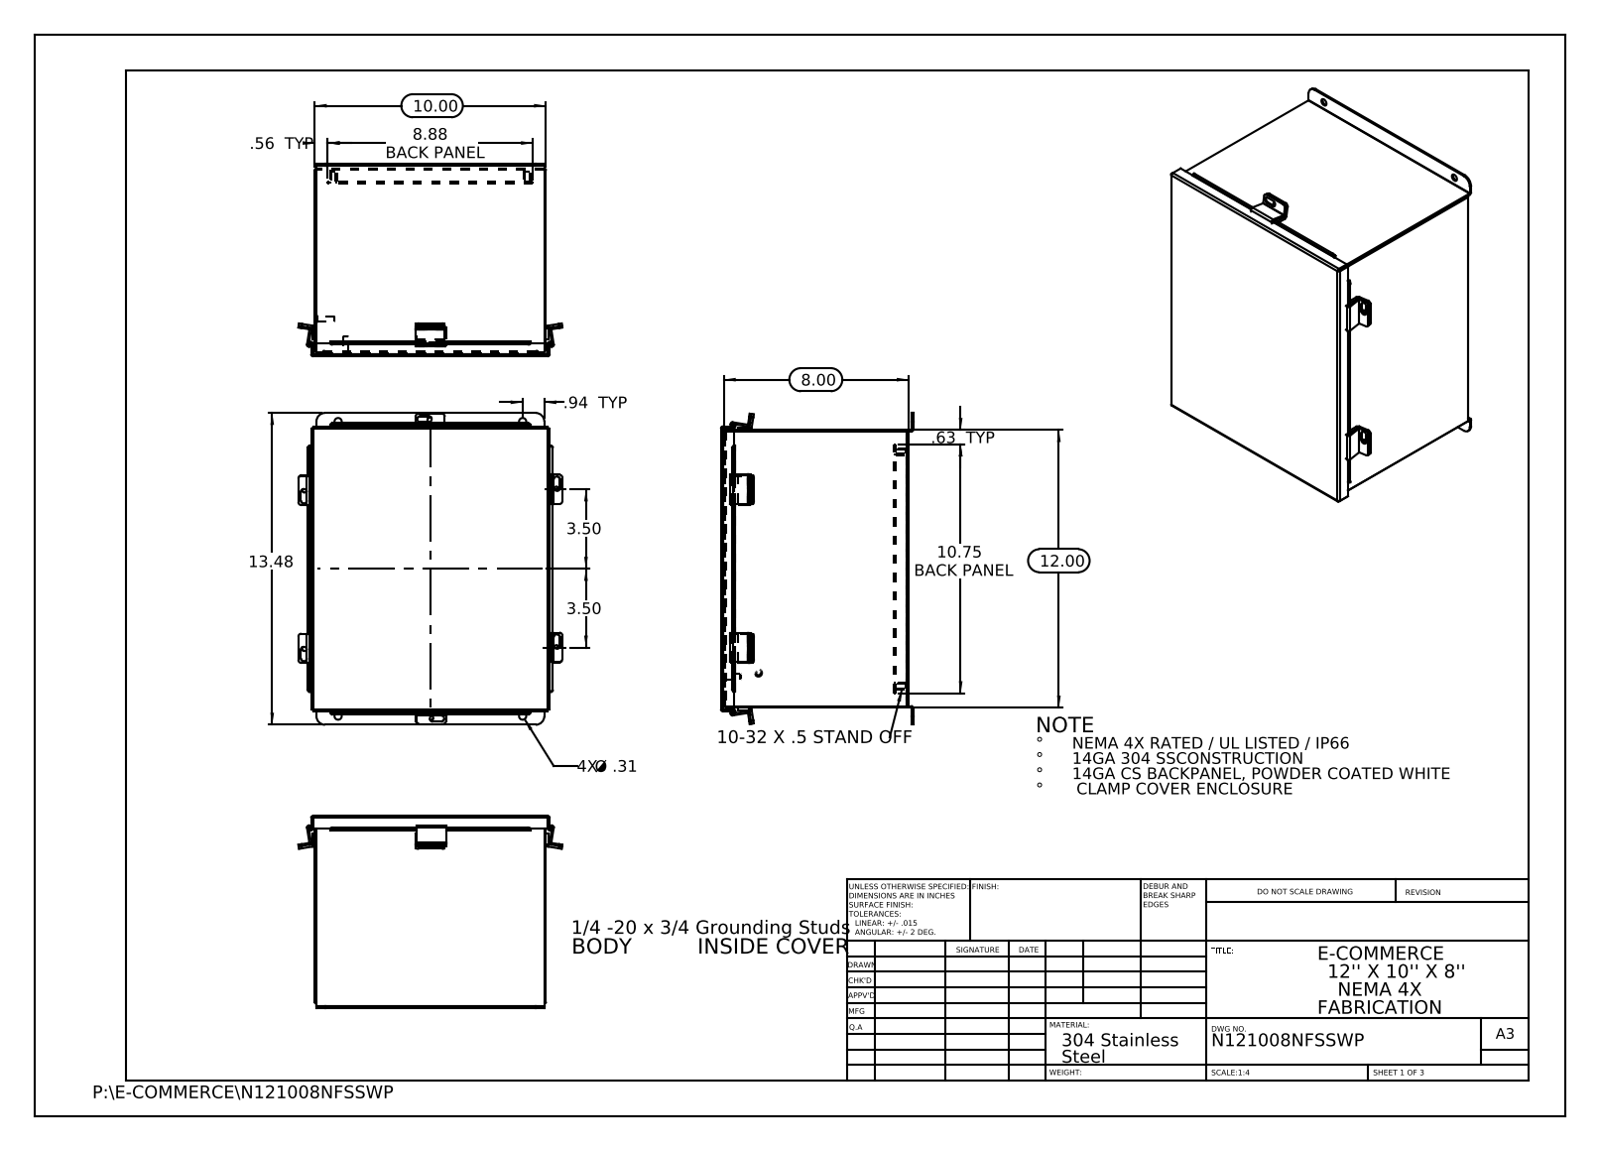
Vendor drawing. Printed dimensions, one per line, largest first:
13.48
12.00
10.75 BACK PANEL
10.00
8.88 BACK PANEL
8.00
3.50
3.50
.94 TYP
.63 TYP
.56 TYP
4X Ø .31
